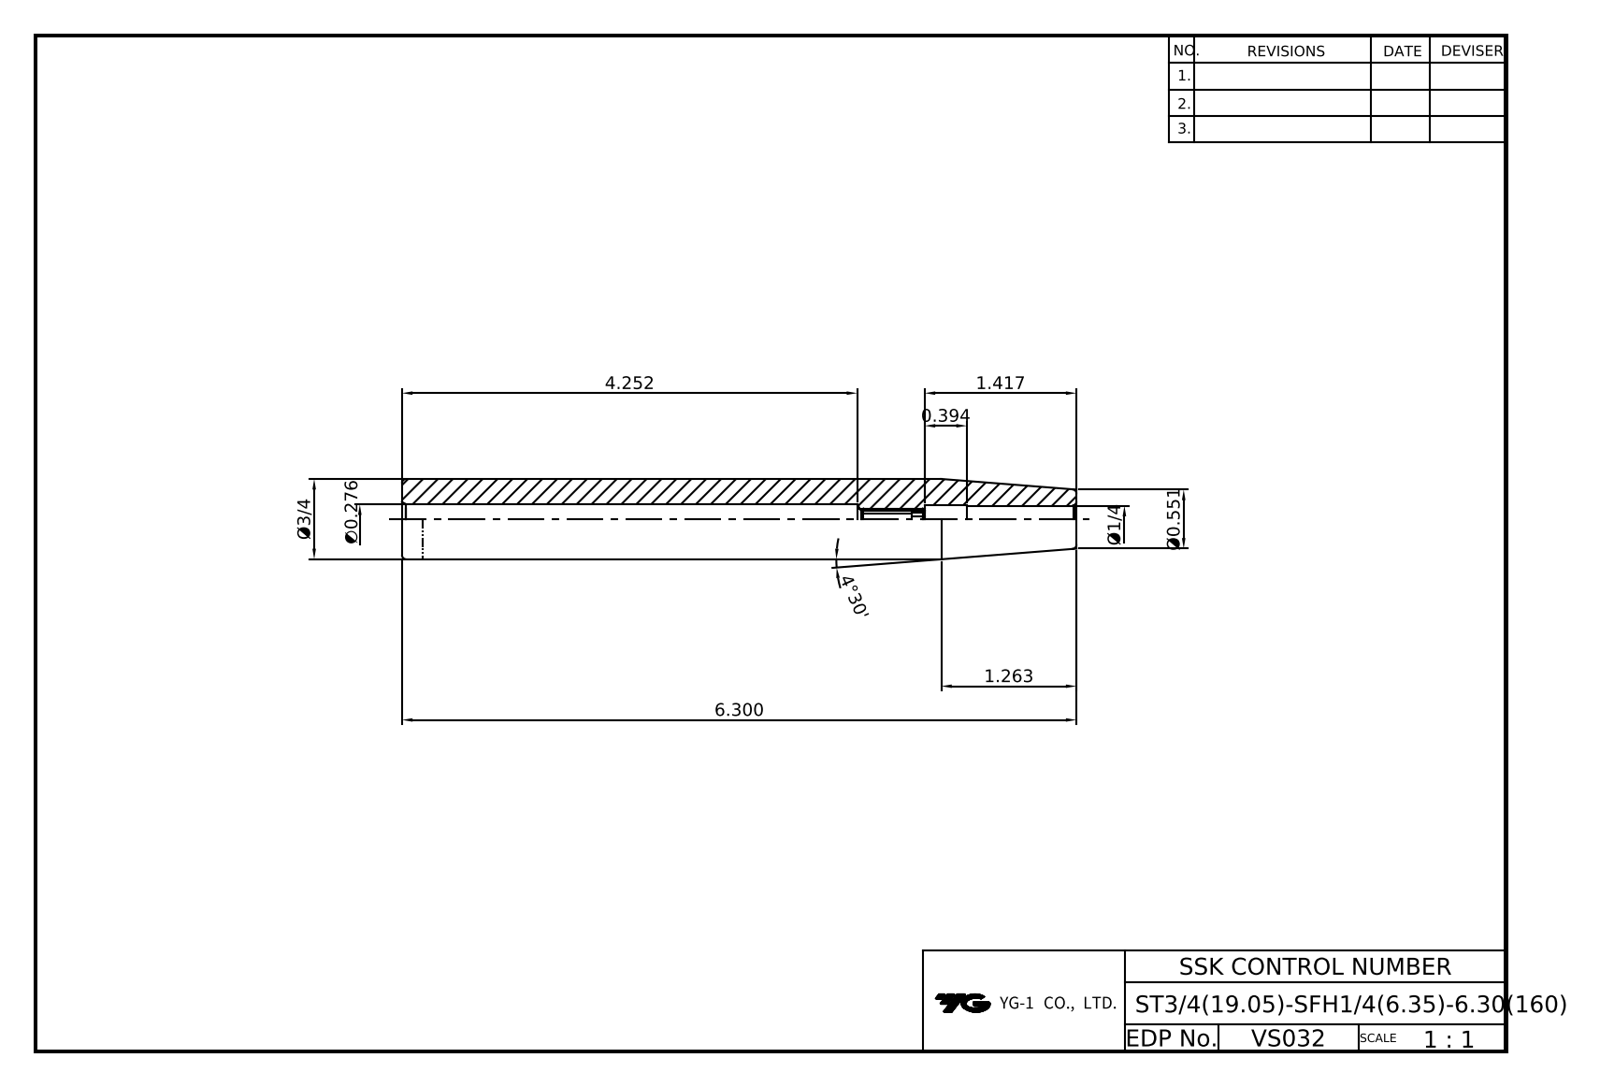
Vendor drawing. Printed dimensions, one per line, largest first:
6.300
4.252
4°30'
1.417
1.263
Ø3/4
Ø0.551
0.394
